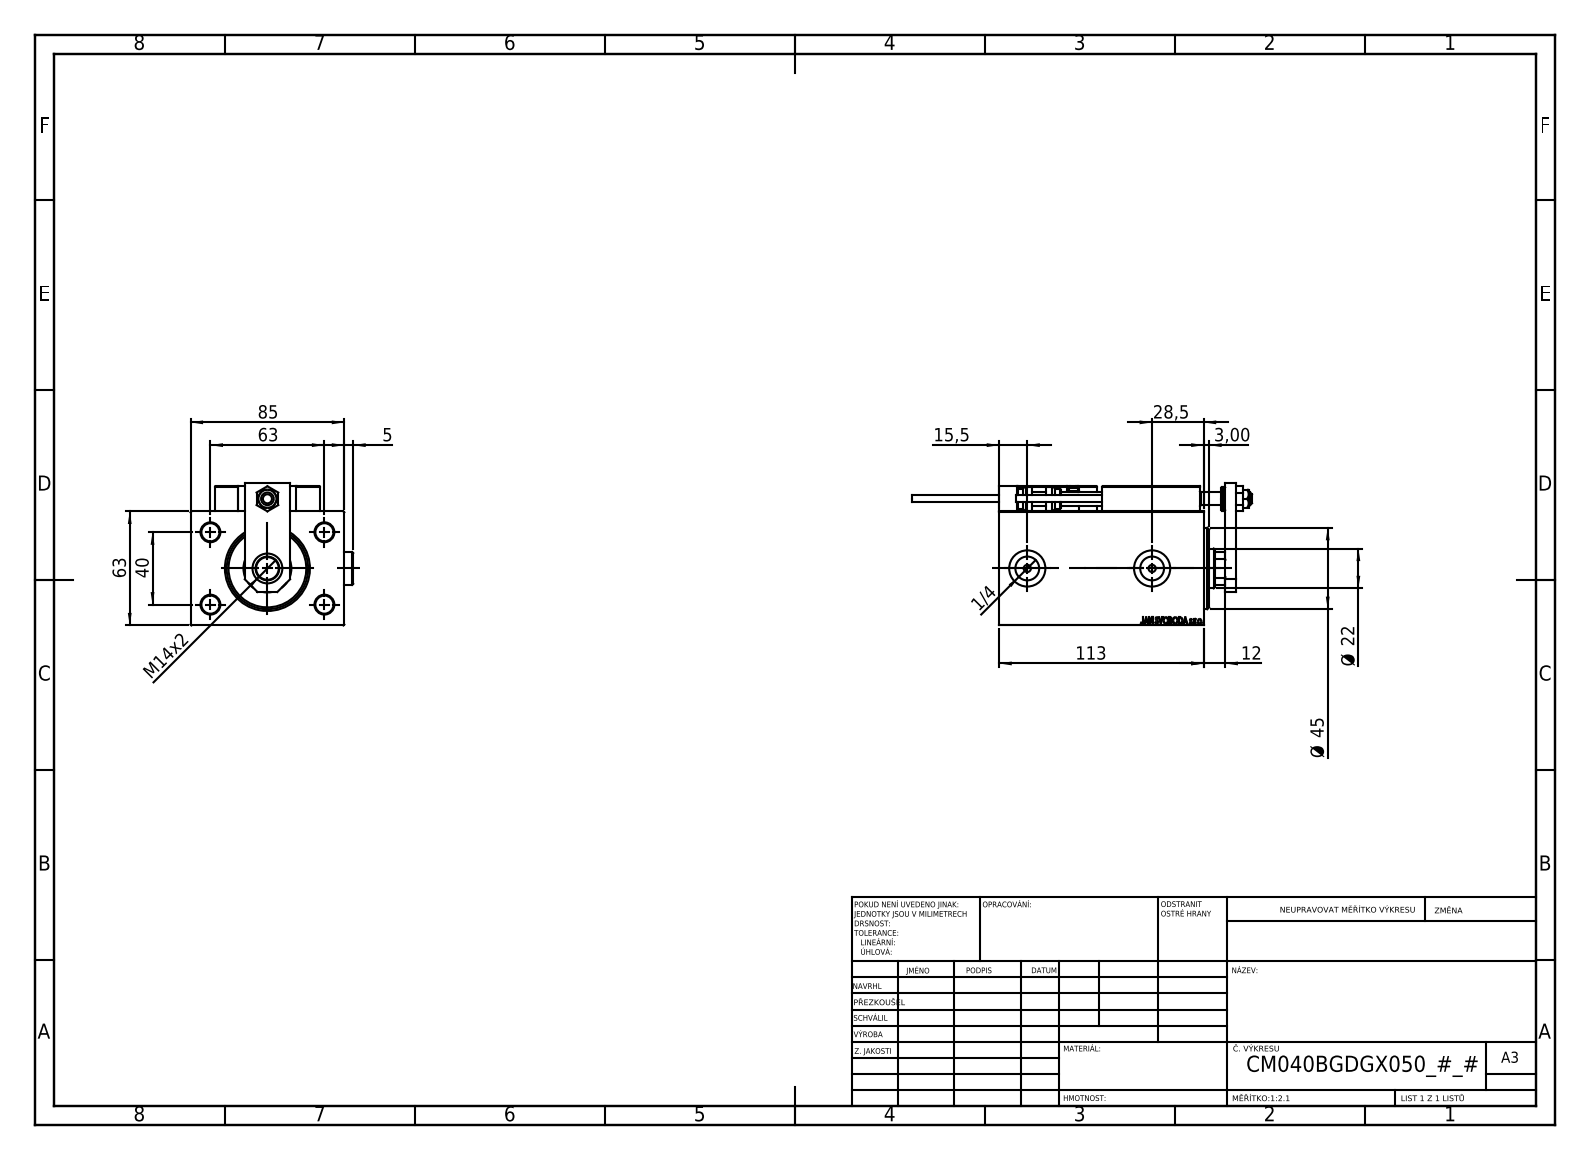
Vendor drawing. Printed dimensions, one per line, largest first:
113
85
63
63
Ø 45
40
28,5
Ø 22
15,5
M14x2
12
5
3,00
1/4
